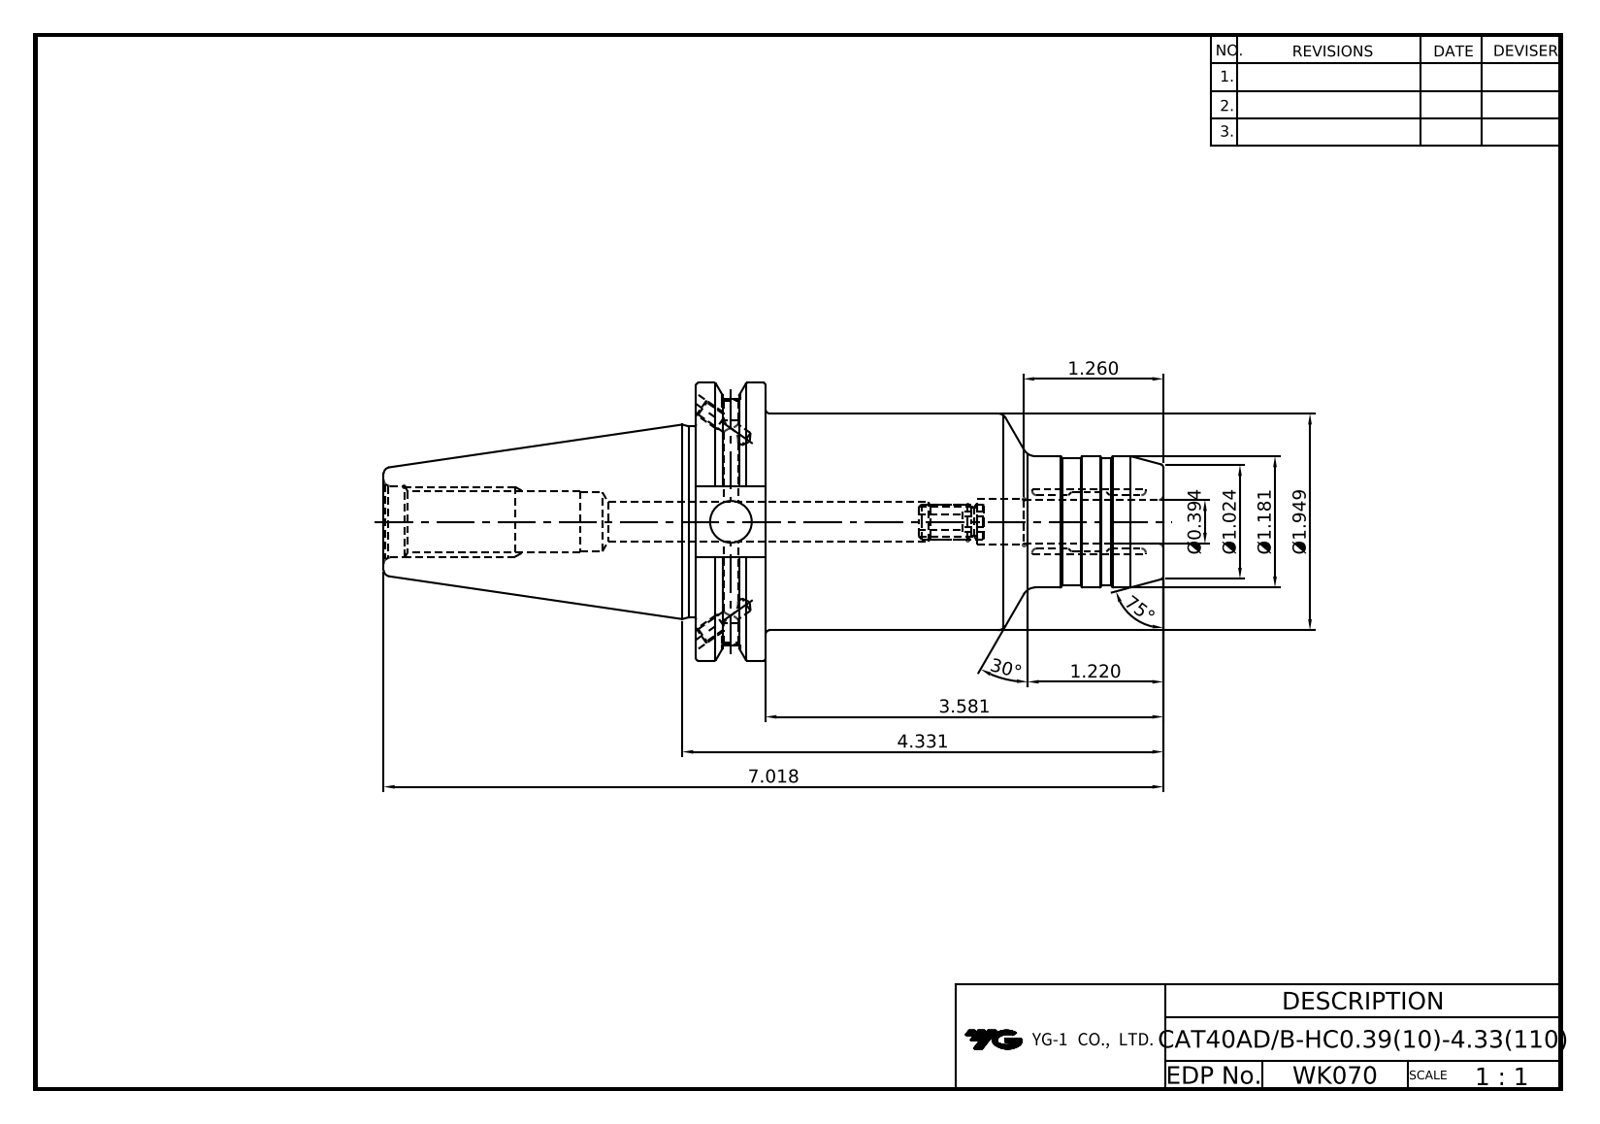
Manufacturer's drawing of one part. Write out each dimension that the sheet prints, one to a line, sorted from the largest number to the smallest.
75°
30°
7.018
4.331
3.581
Ø1.949
1.260
1.220
Ø1.181
Ø1.024
Ø0.394
